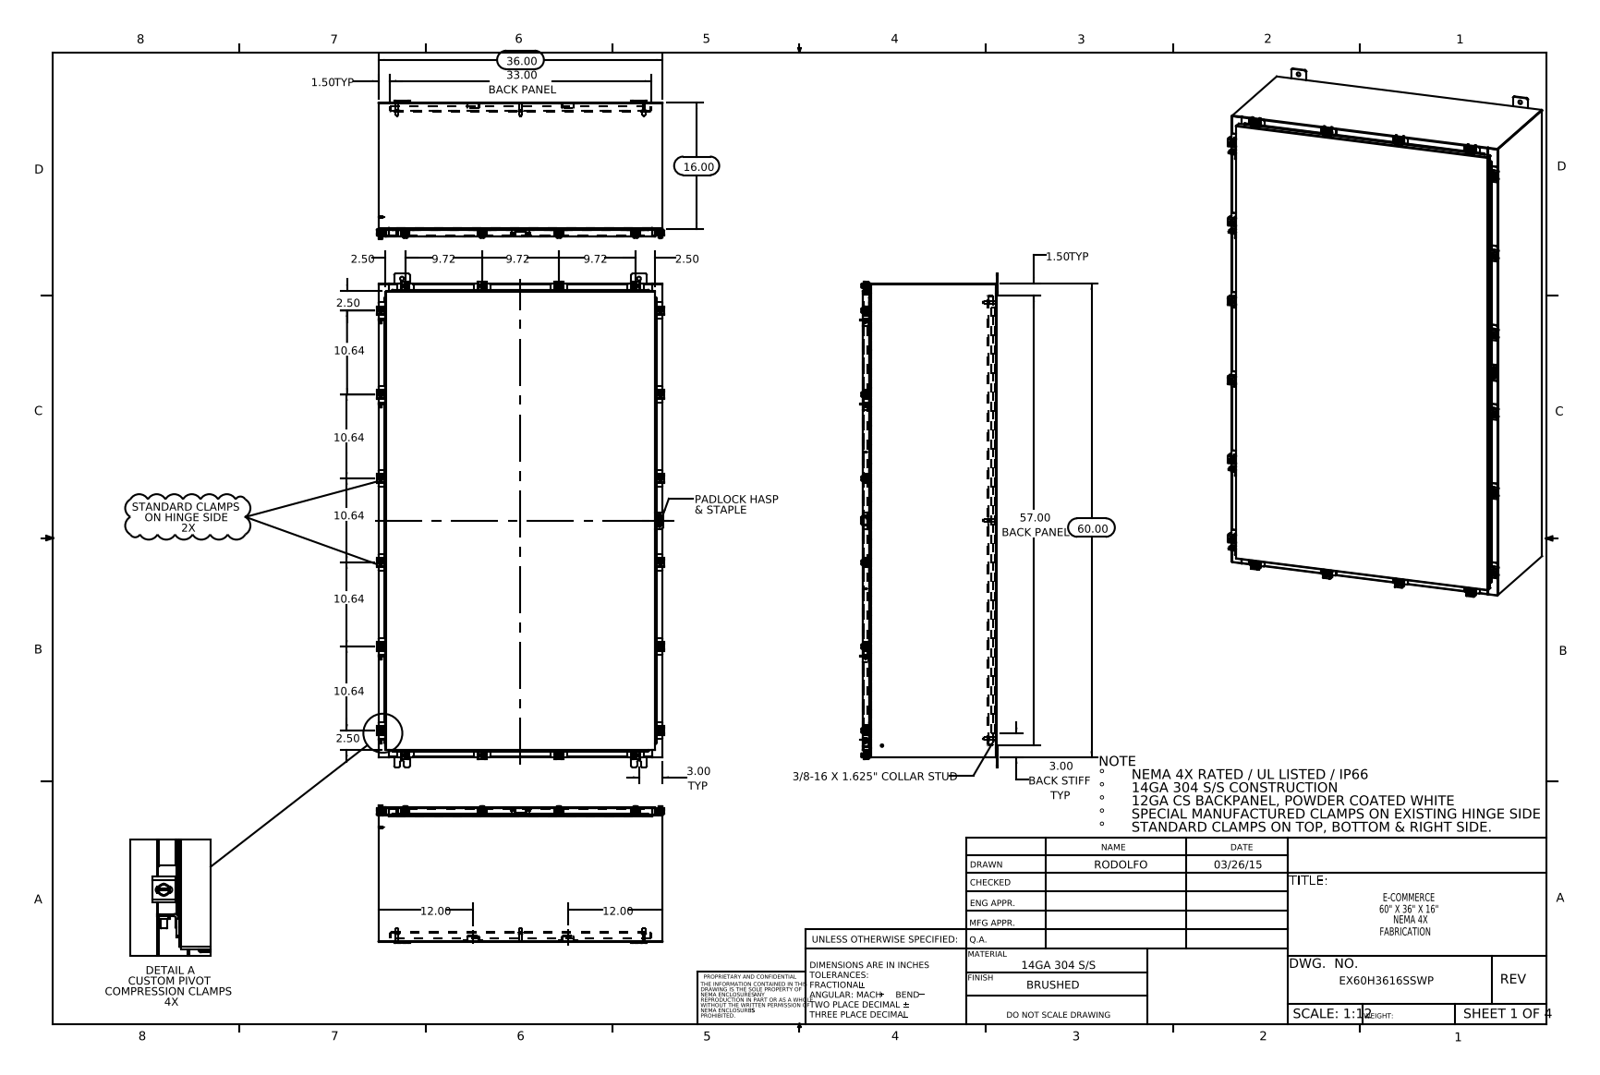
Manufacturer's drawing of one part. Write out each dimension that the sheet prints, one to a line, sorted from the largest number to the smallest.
60.00
57.00 BACK PANEL
36.00
33.00 BACK PANEL
16.00
12.00
12.00
10.64
10.64
10.64
10.64
10.64
9.72
9.72
9.72
3.00 TYP
3.00 BACK STIFF TYP
2.50
2.50
2.50
2.50
1.50 TYP
1.50 TYP
